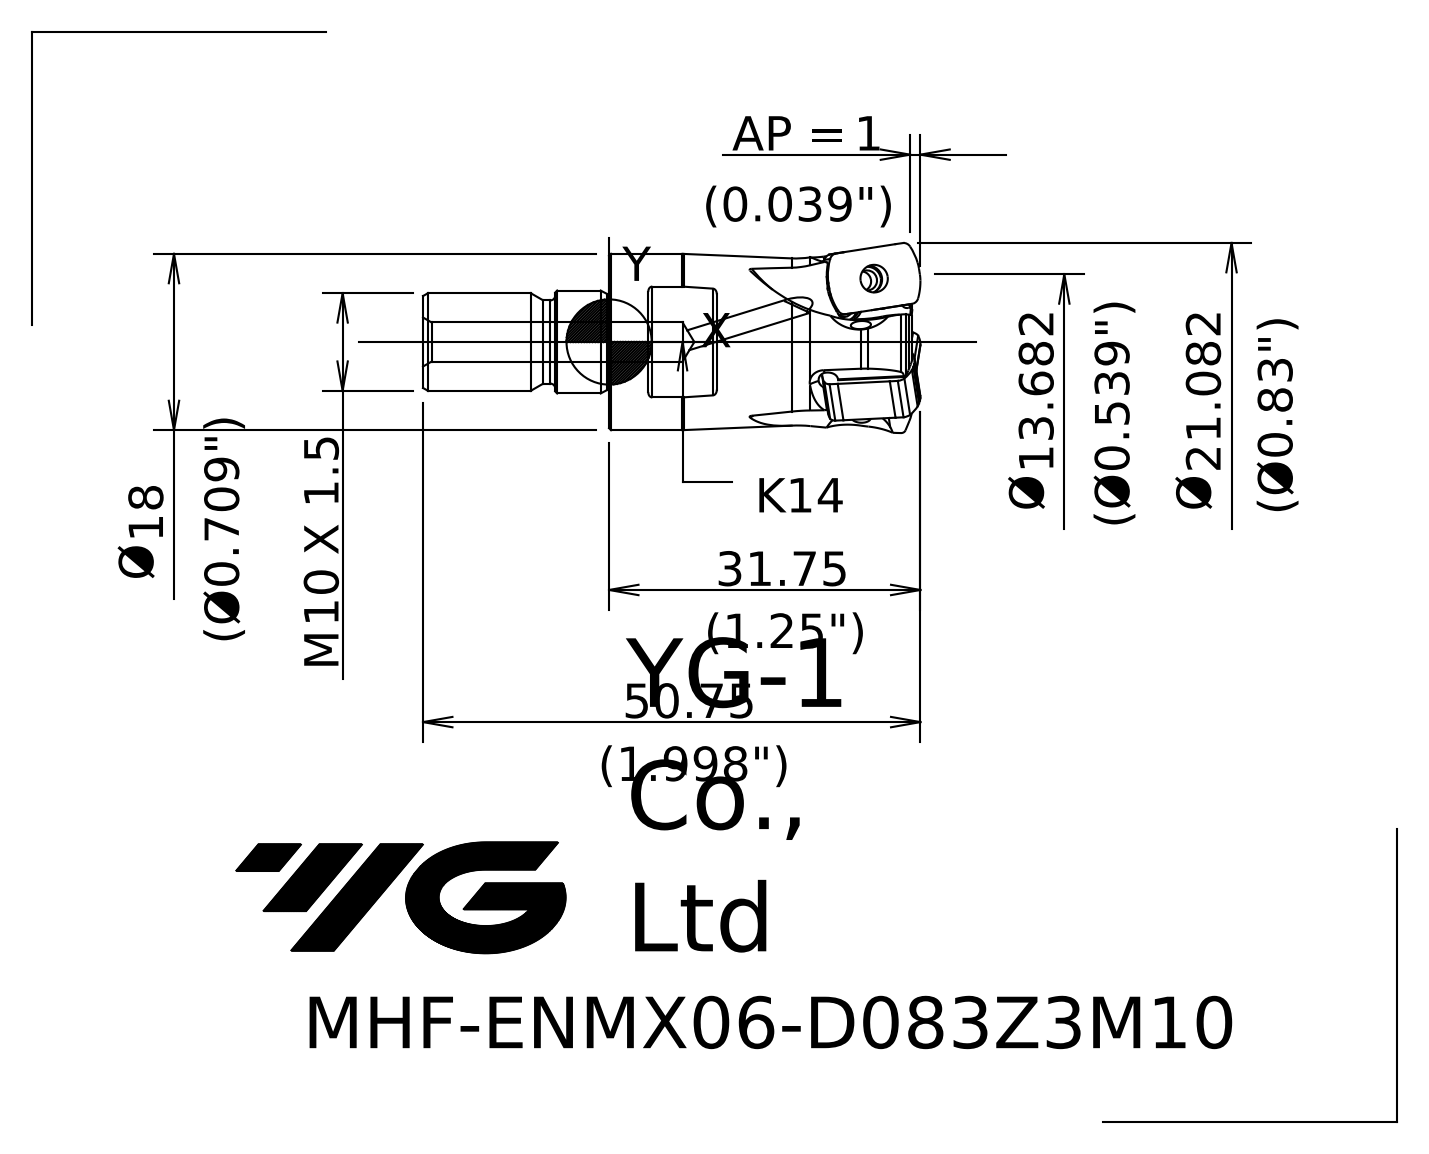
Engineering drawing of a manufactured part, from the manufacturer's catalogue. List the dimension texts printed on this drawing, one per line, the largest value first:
18 Ø
13.682 Ø
M X 1.5 10
